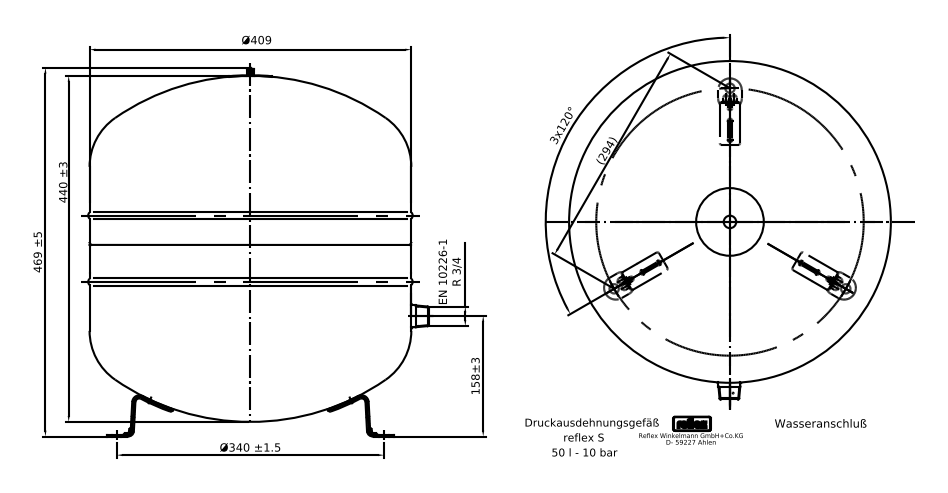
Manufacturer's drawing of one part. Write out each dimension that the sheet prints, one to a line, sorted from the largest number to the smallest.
EN 10226-1 R 3/4
469 ±5
440 ±3
Ø409
Ø340 ±1.5
(294)
158±3
3x120°
